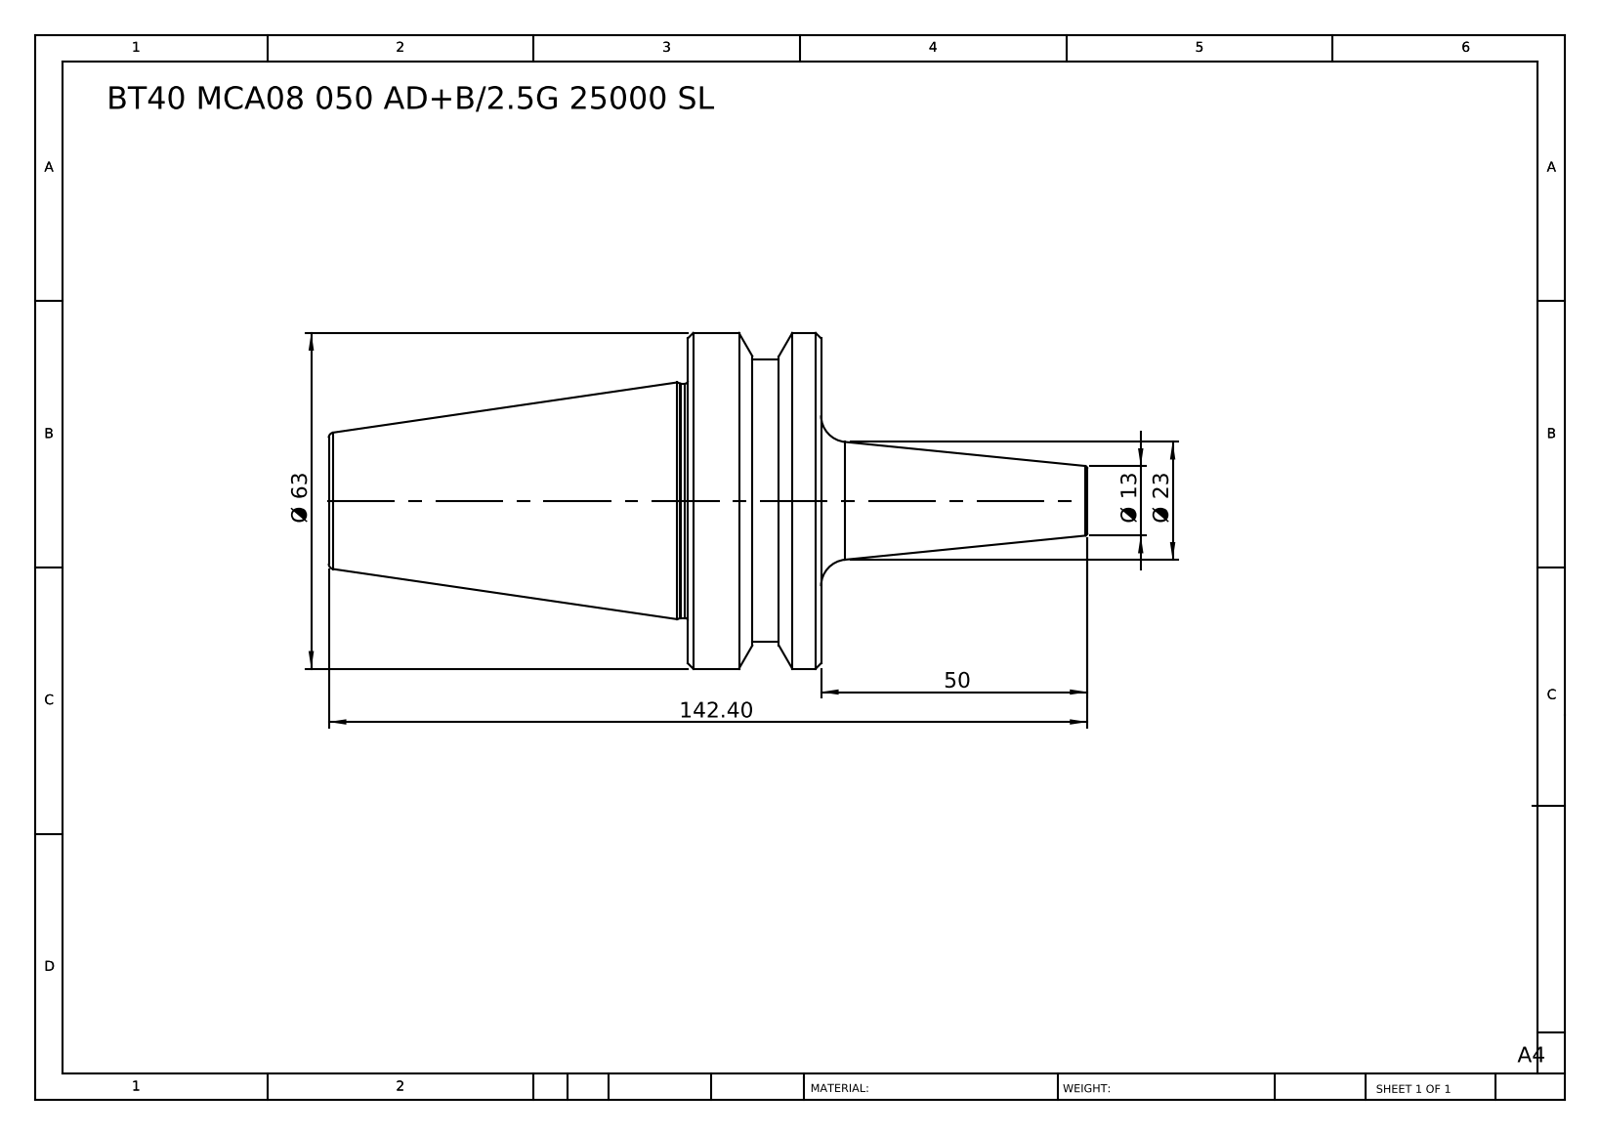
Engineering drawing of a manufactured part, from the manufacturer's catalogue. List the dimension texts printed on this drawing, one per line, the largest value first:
142.40
Ø 63
50
Ø 23
Ø 13
